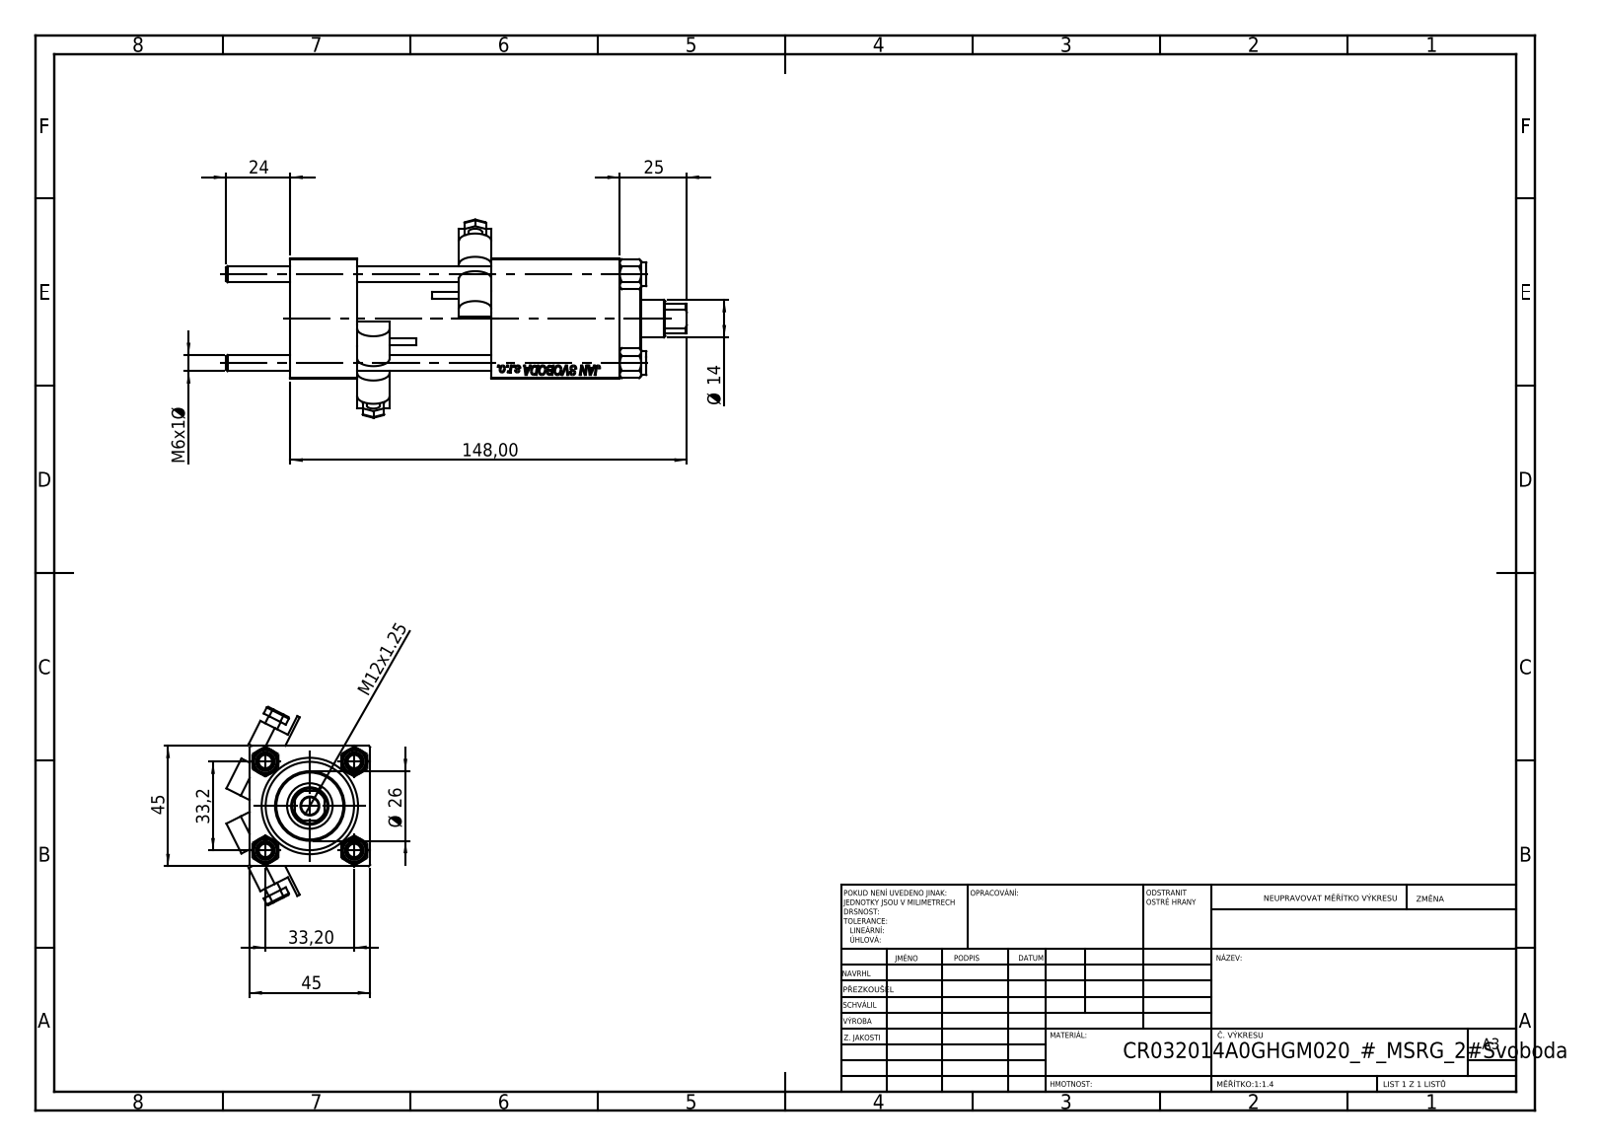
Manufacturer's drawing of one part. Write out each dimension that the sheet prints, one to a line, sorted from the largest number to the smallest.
148,00
45
45
33,2
33,20
Ø 26
25
24
Ø 14
M12x1.25
M6x1 Ø
